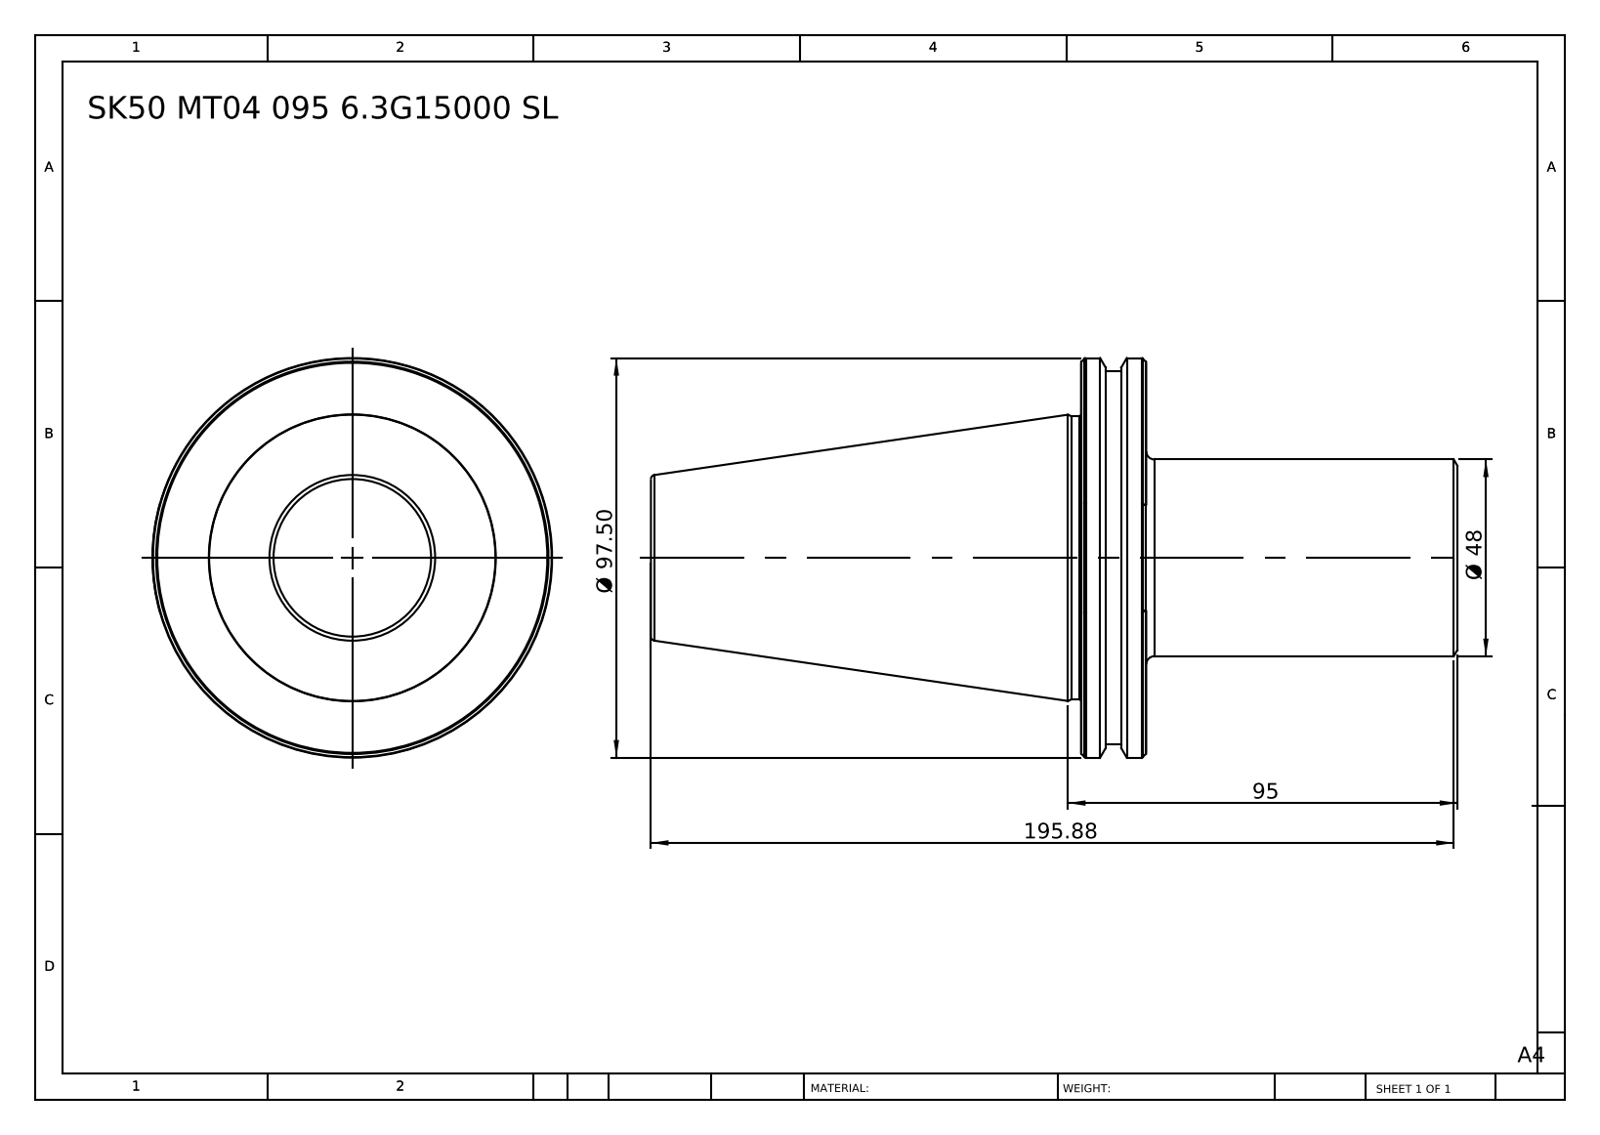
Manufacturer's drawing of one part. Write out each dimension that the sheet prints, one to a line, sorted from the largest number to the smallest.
195.88
Ø 97.50
95
Ø 48
